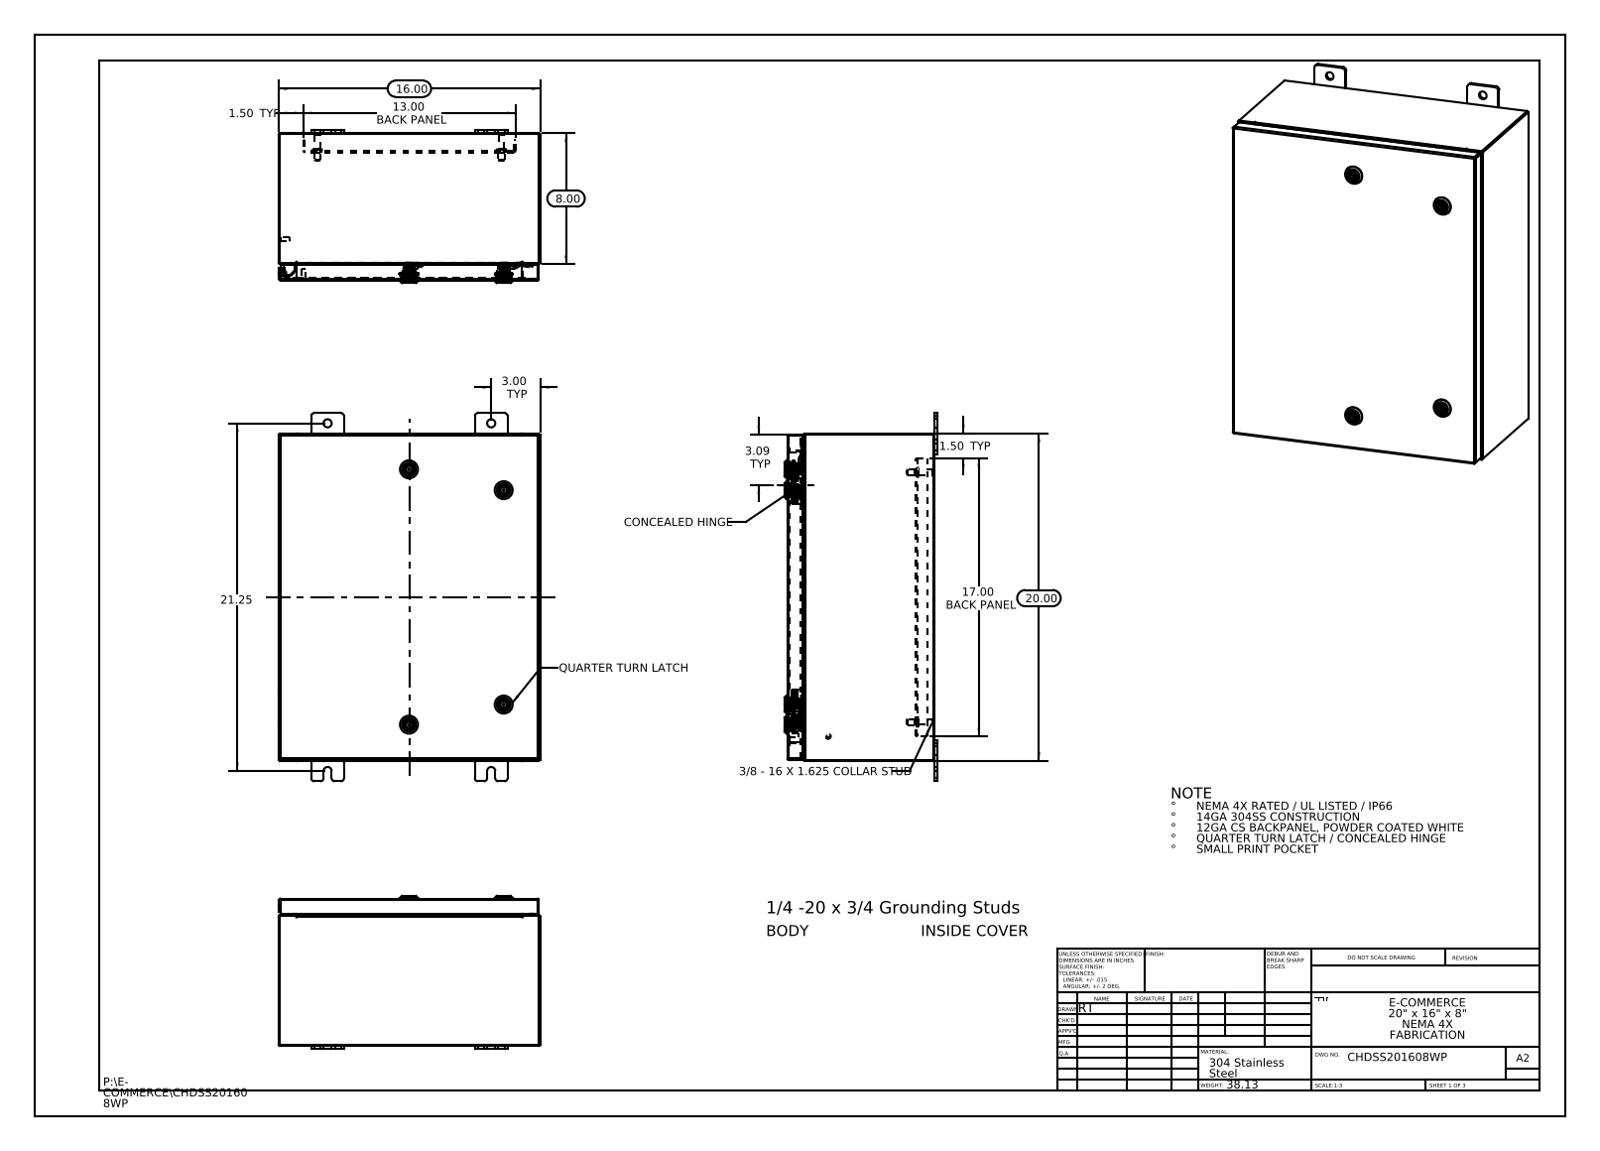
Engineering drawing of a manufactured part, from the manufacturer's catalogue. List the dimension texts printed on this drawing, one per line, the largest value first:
21.25
20.00
17.00 BACK PANEL
16.00
13.00 BACK PANEL
8.00
3.09 TYP
3.00 TYP
1.50 TYP
1.50 TYP
